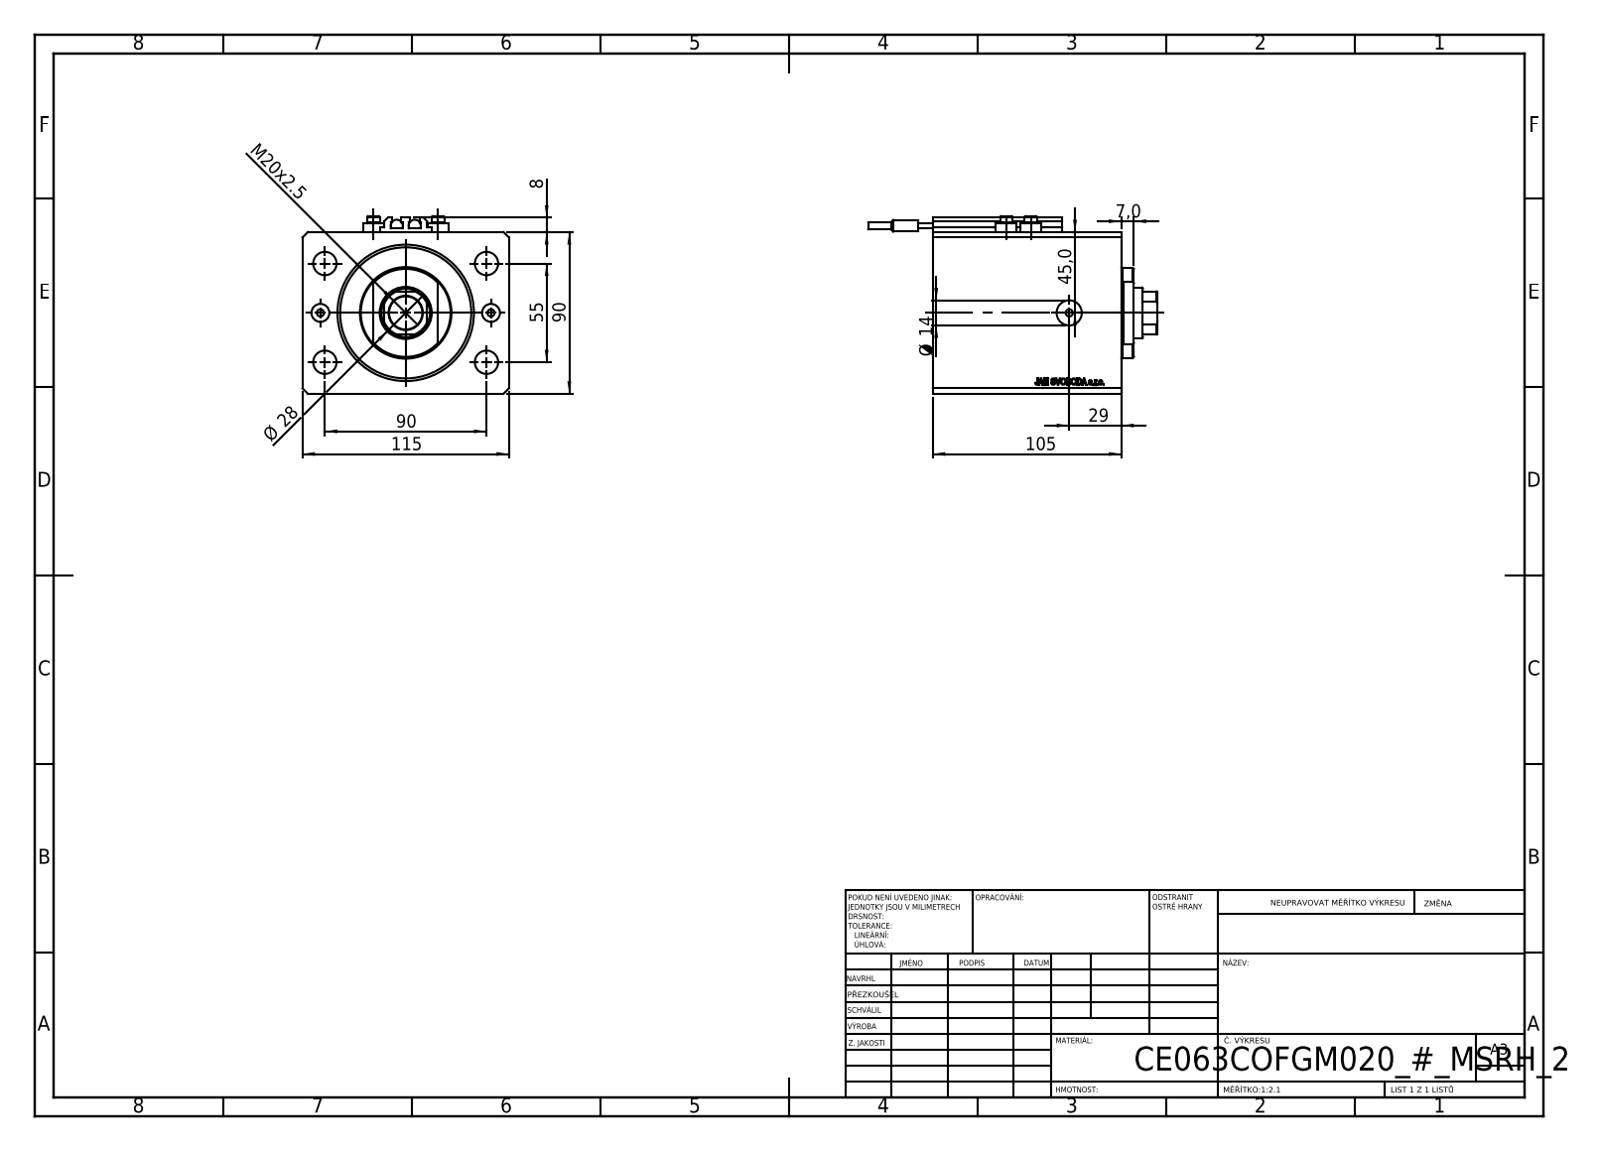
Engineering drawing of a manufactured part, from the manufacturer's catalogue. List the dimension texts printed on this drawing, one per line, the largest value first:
115
105
90
90
55
45,0
29
Ø 28
M20x2.5
Ø 14
8
7,0
